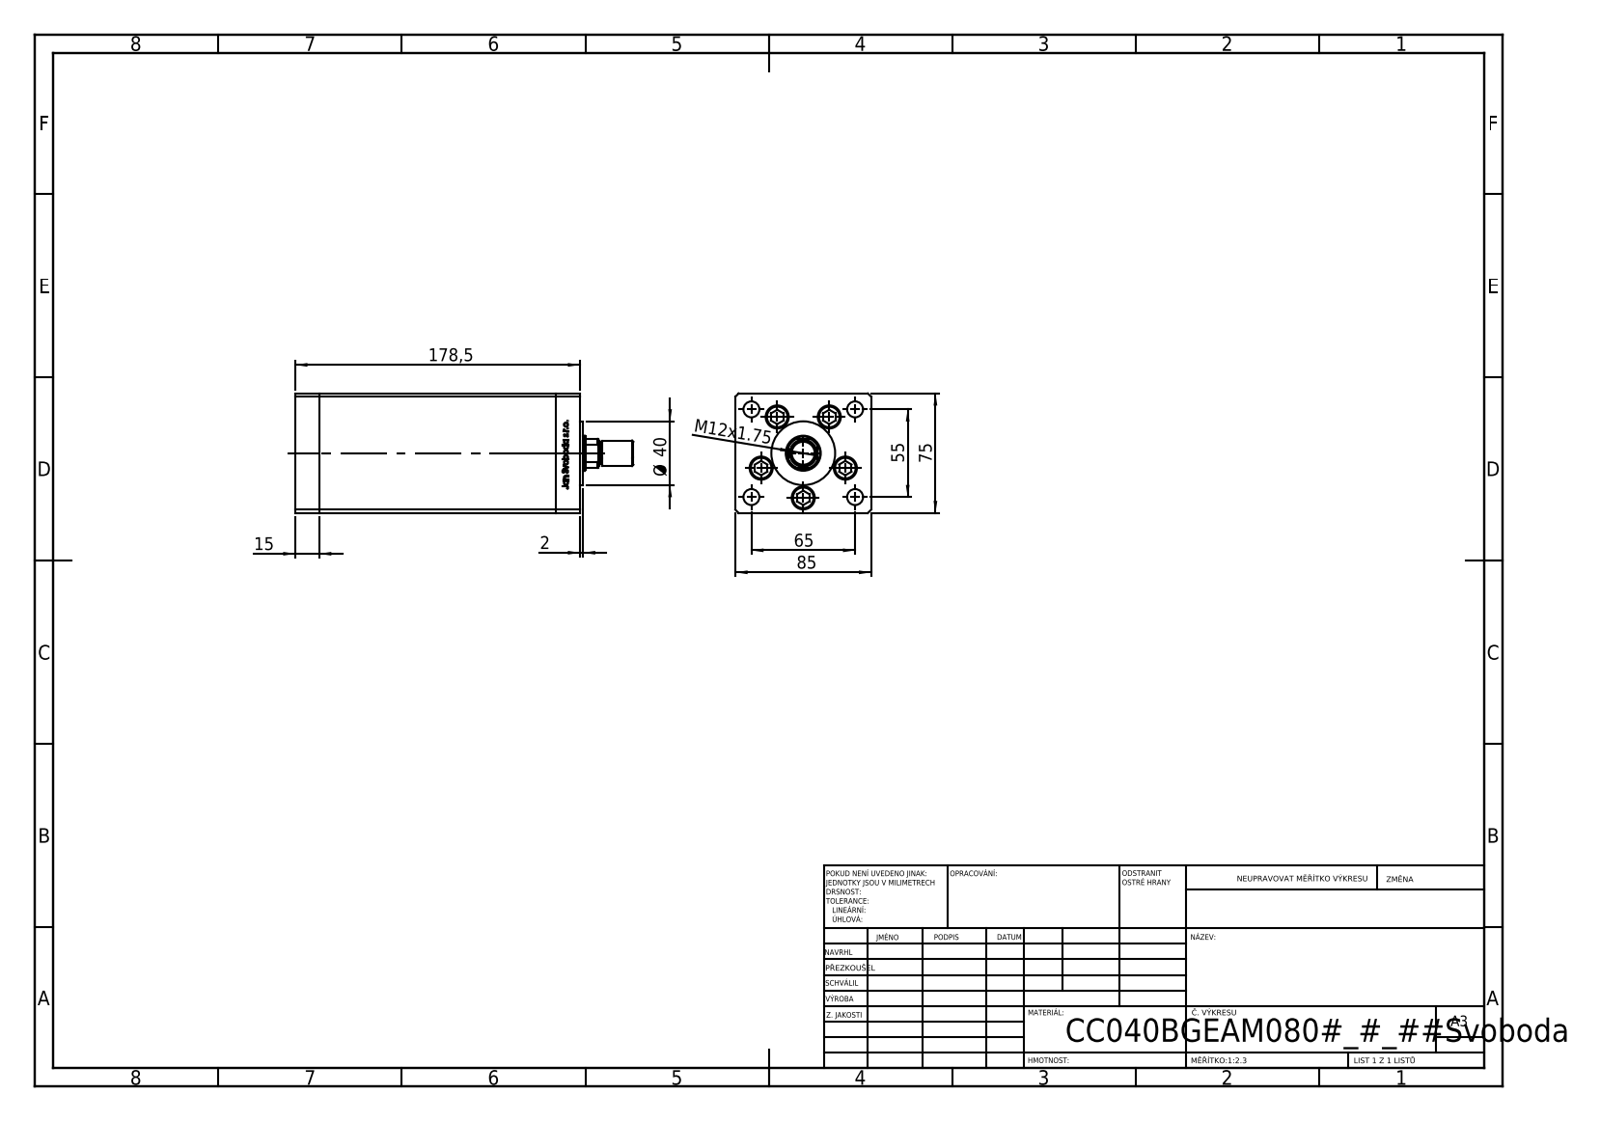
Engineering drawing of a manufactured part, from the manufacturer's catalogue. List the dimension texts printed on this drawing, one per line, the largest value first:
178,5
85
75
65
55
Ø 40
15
M12x1.75
2
